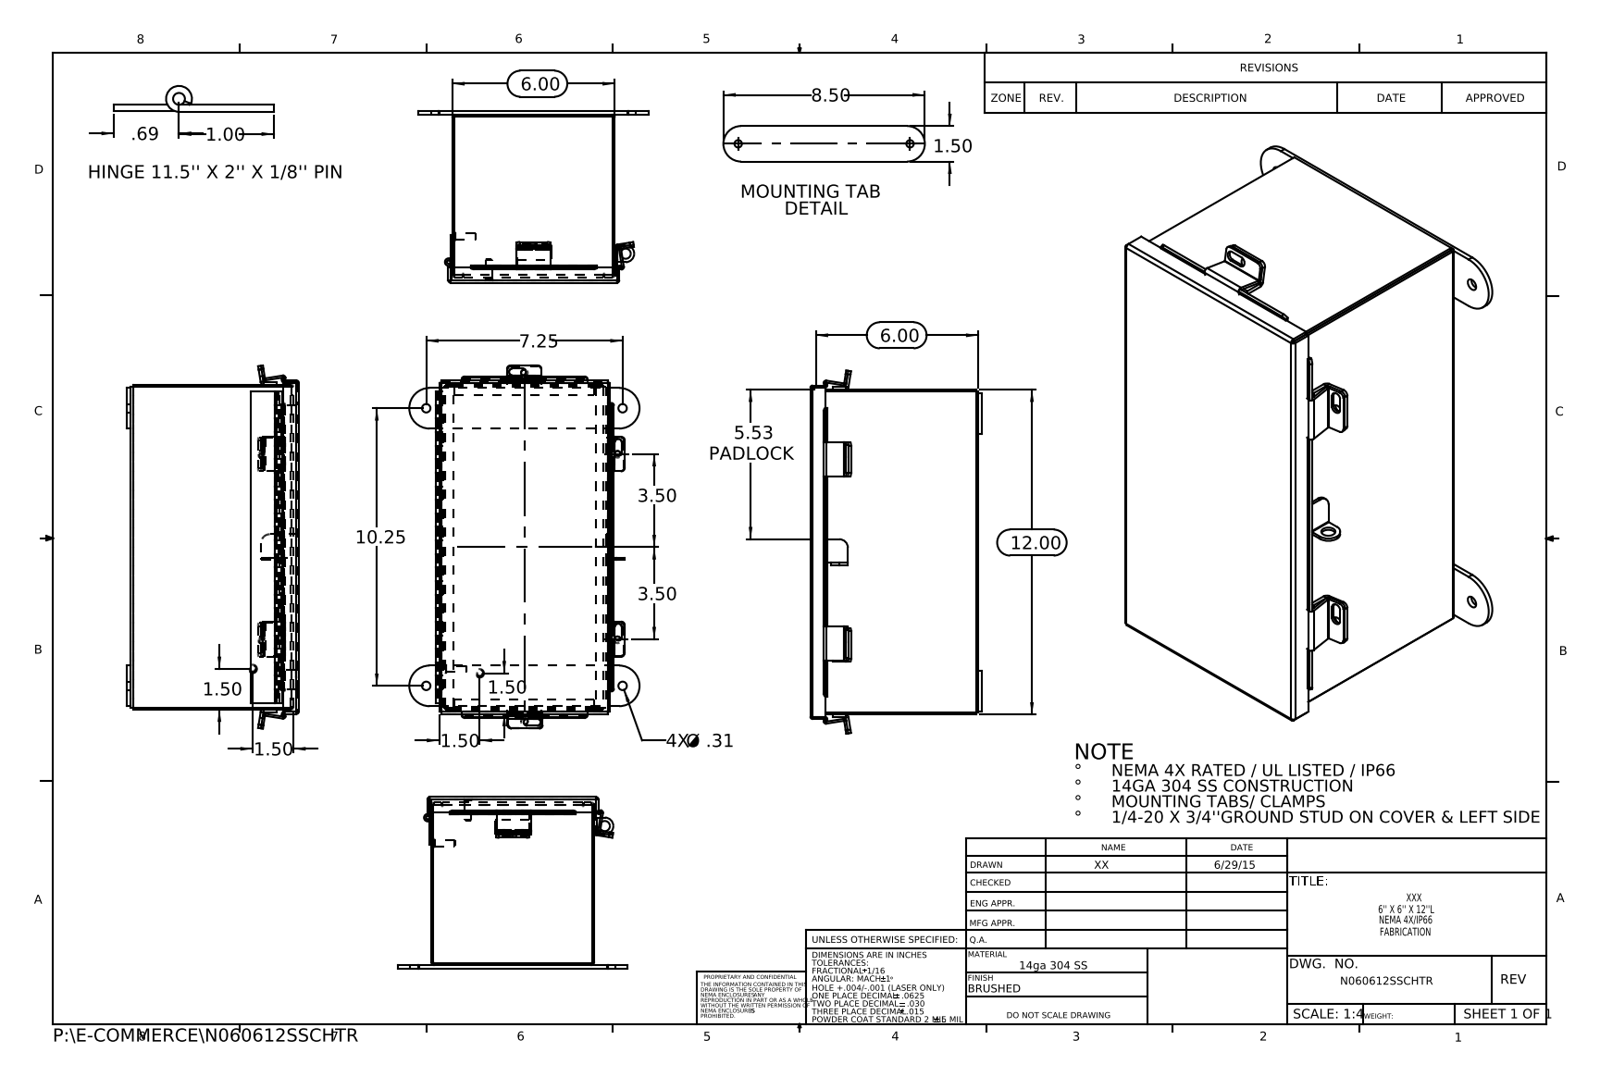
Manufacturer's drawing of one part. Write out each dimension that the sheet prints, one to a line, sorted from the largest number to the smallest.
12.00
10.25
8.50
7.25
6.00
6.00
5.53 PADLOCK
3.50
3.50
1.50
1.50
1.50
1.50
1.50
1.00
.69
4X Ø .31
